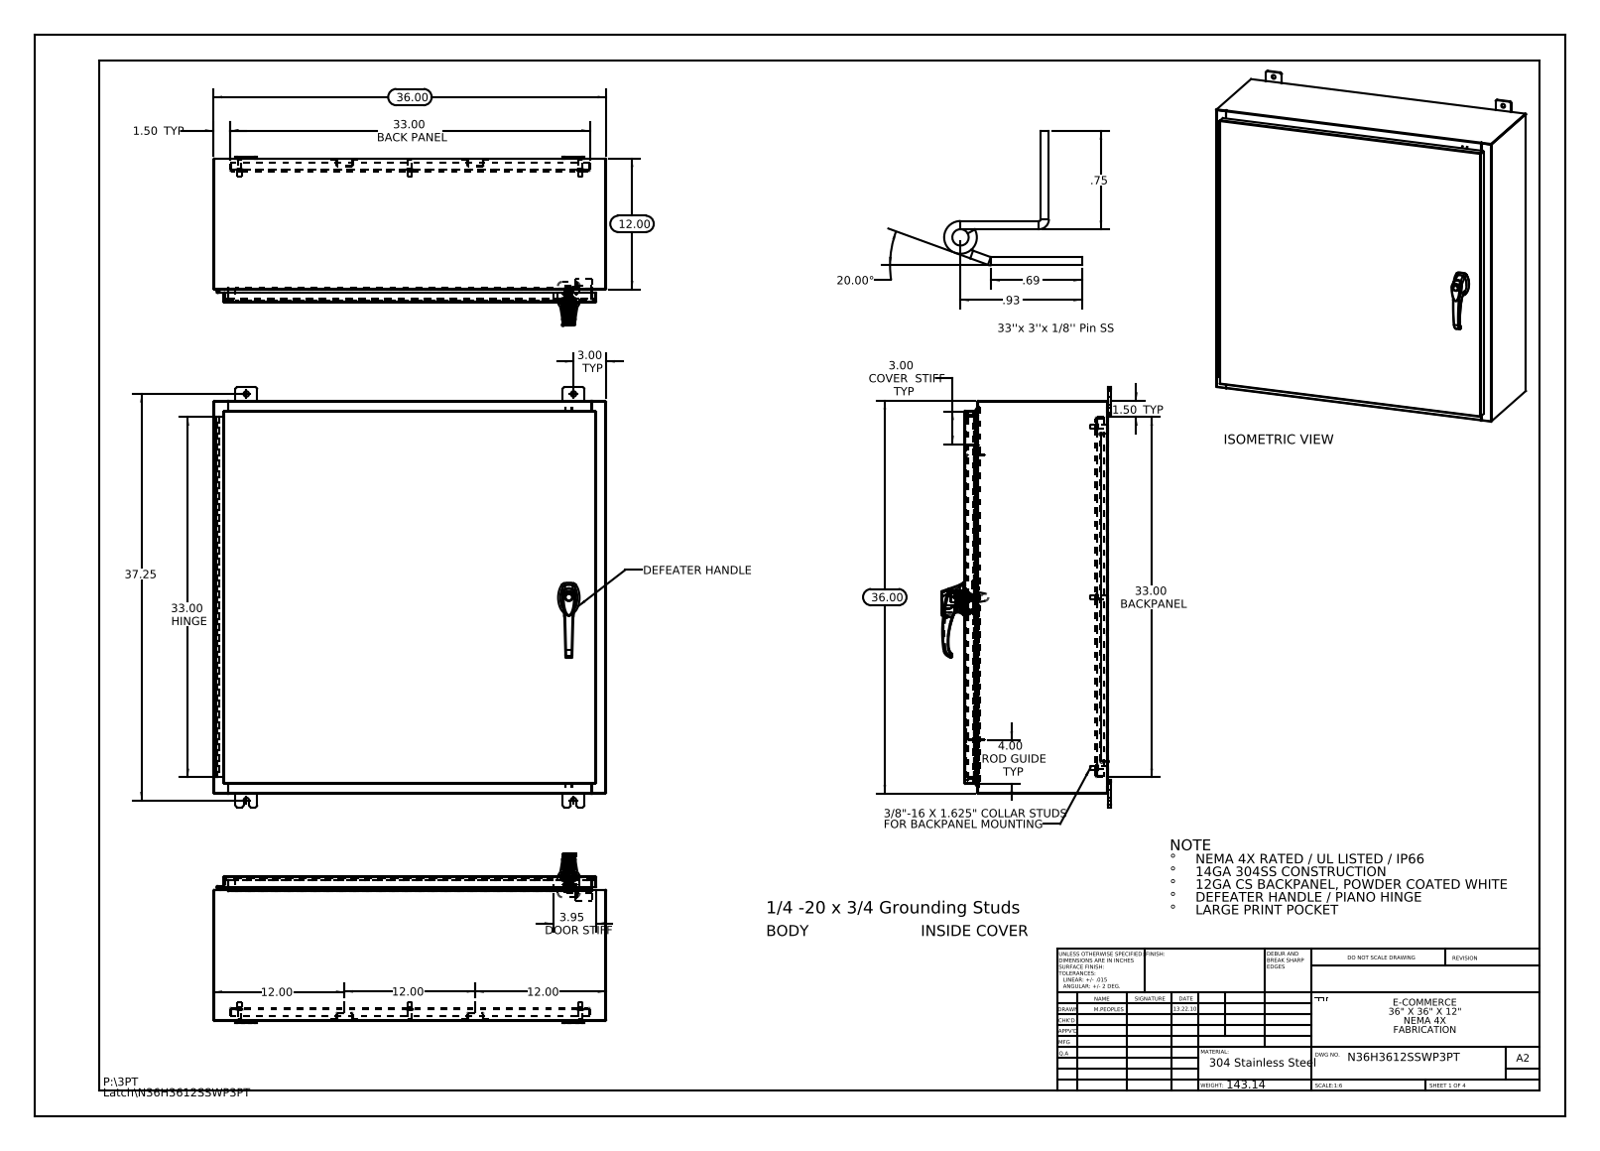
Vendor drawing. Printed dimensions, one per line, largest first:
37.25
36.00
36.00
33.00 HINGE
33.00 BACK PANEL
33.00 BACKPANEL
20.00°
12.00
12.00
12.00
12.00
4.00 ROD GUIDE TYP
3.95 DOOR STIFF
3.00 TYP
3.00 COVER STIFF TYP
1.50 TYP
1.50 TYP
.93
.75
.69
